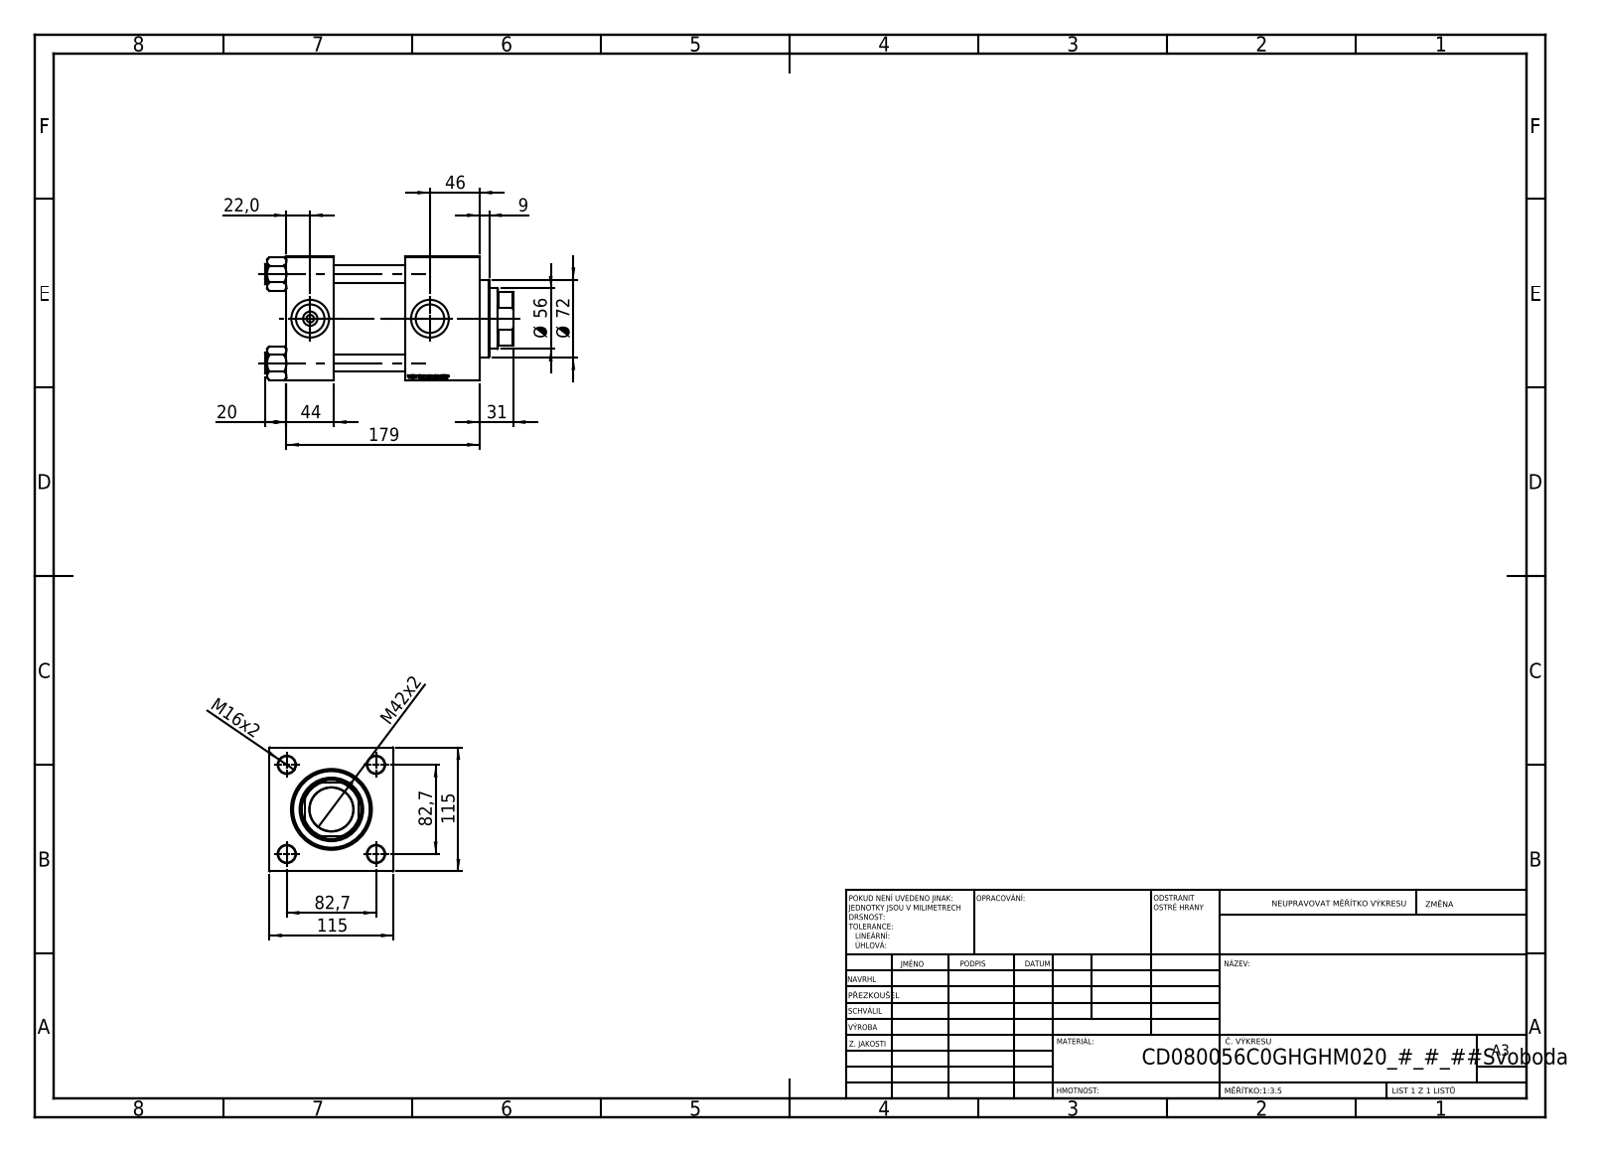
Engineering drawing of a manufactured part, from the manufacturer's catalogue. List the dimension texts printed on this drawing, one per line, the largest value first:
179
115
115
82,7
82,7
Ø 72
Ø 56
46
44
M42x2
31
22,0
20
M16x2
9
